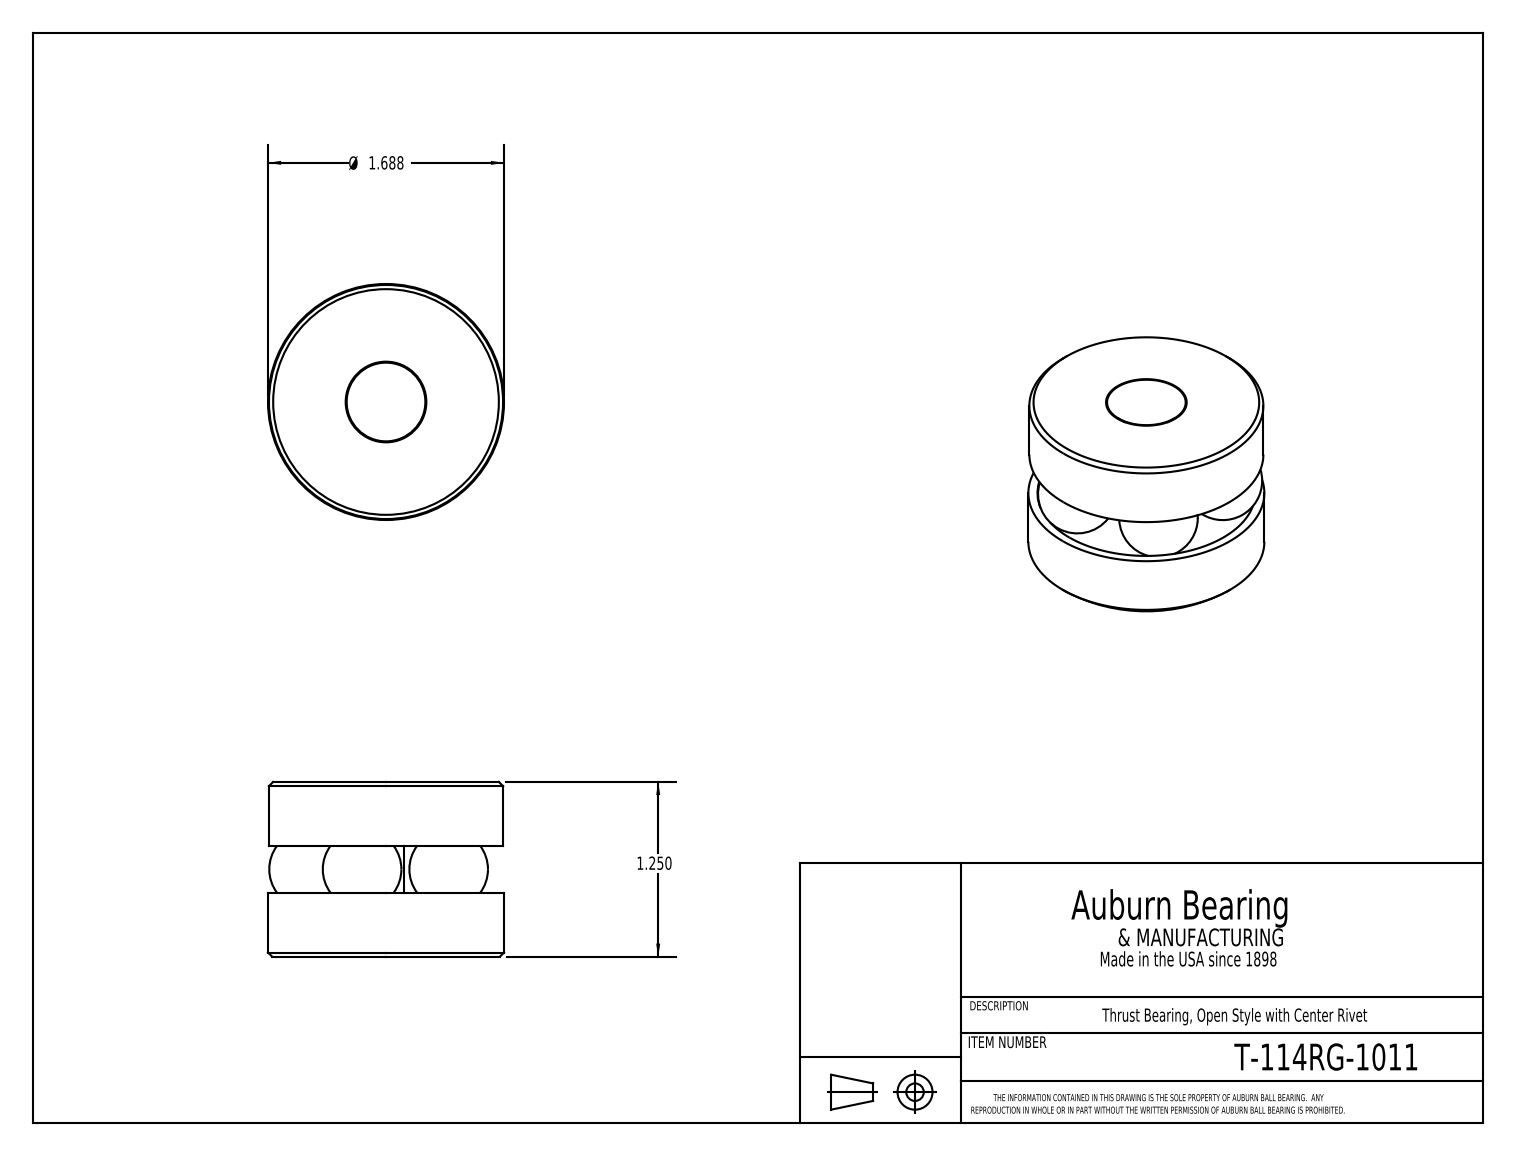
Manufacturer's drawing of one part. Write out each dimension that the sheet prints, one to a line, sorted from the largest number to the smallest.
Ø 1.688
1.250
